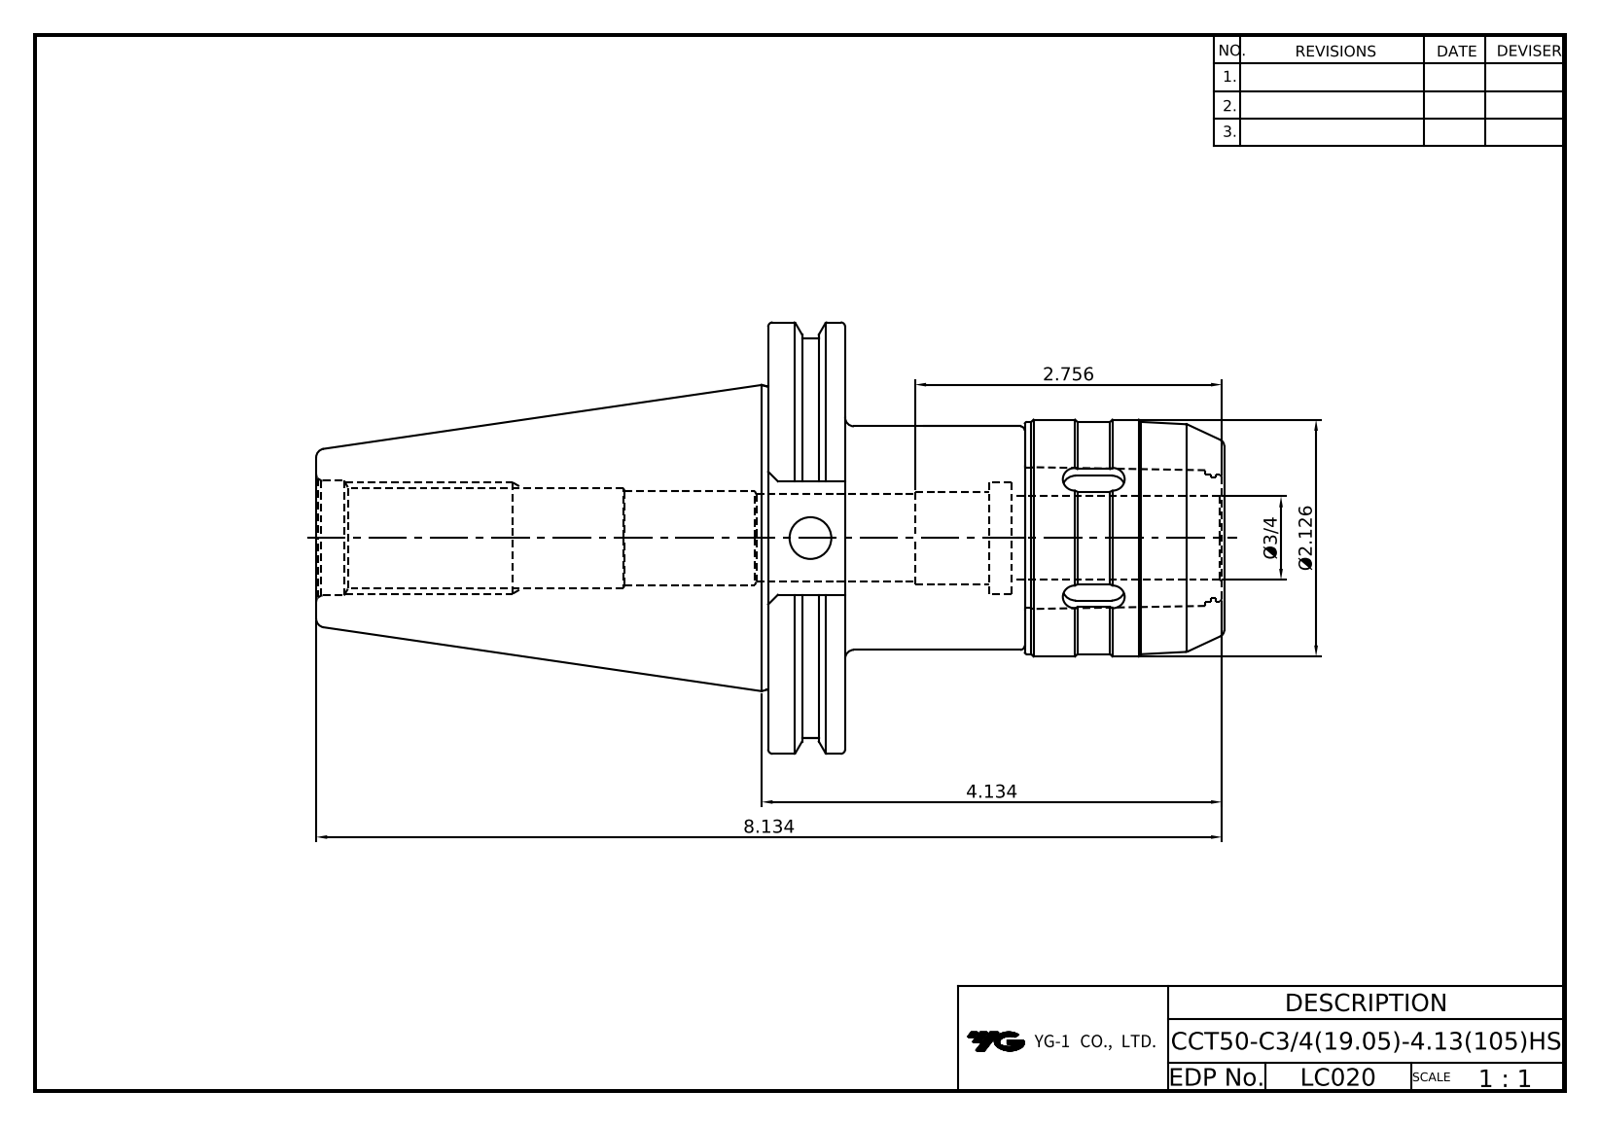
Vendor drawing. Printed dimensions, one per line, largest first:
8.134
4.134
2.756
Ø2.126
Ø3/4
